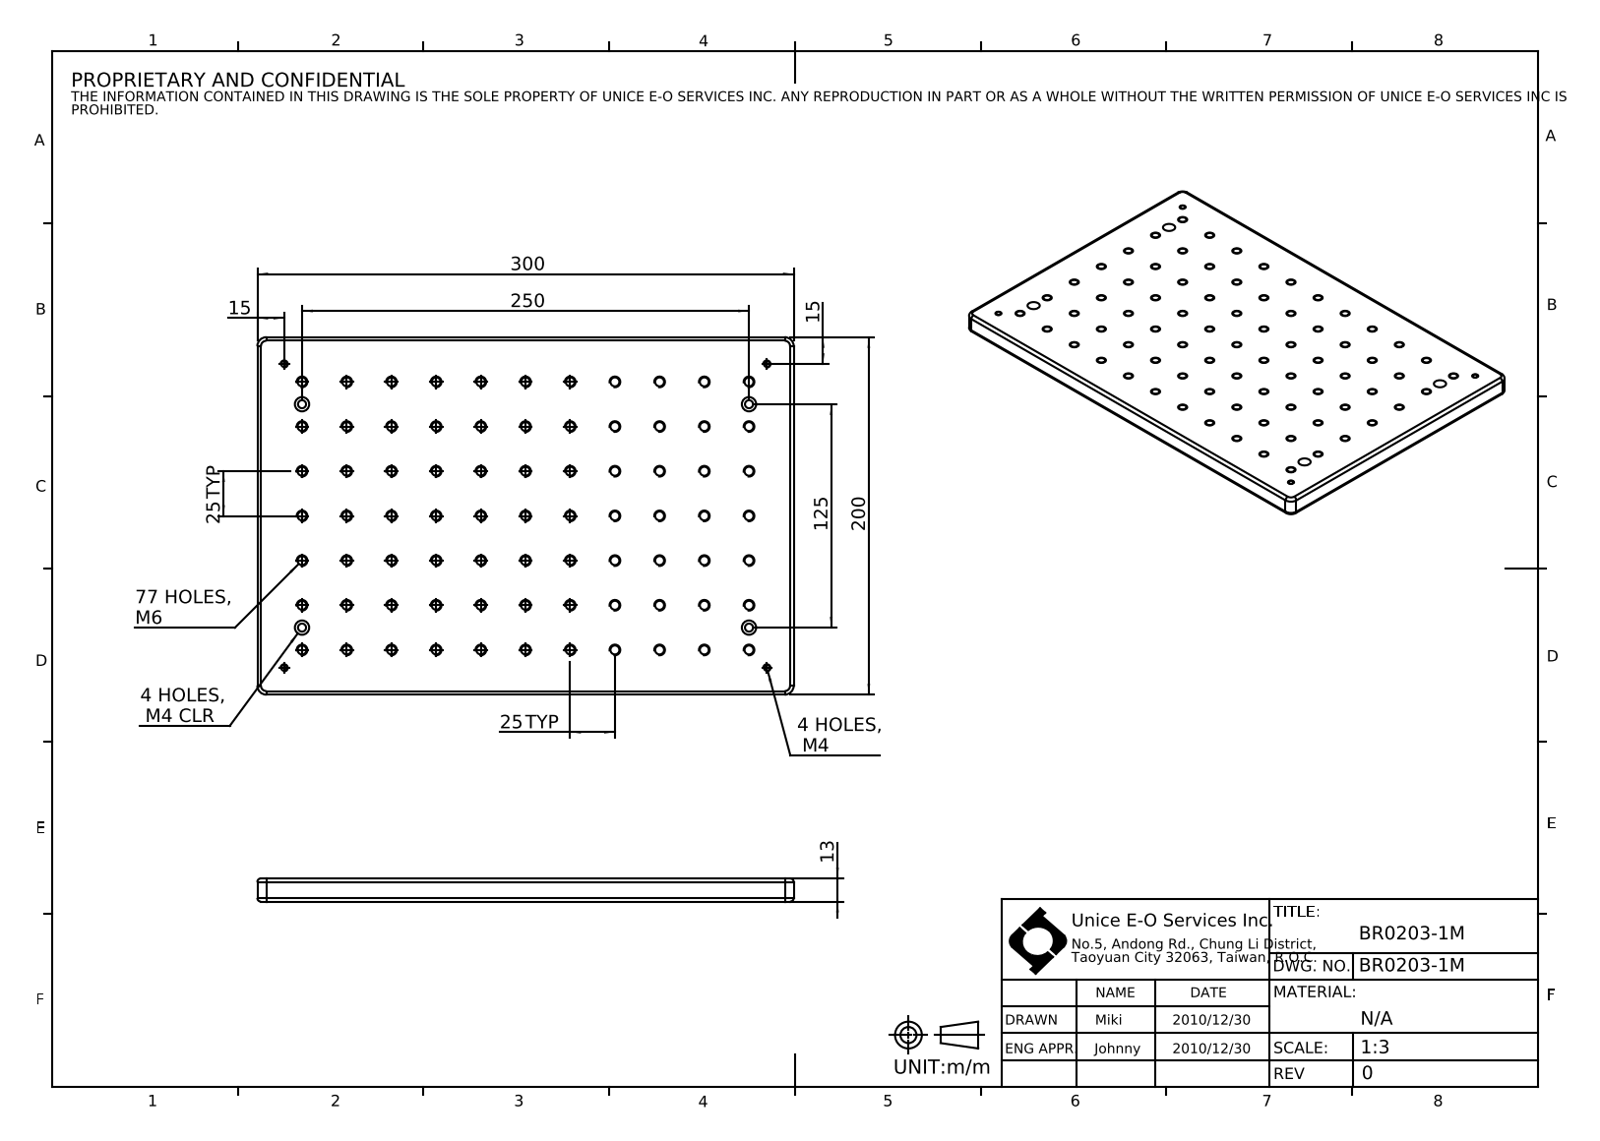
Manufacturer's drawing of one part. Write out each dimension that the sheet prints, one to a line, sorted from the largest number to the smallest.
300
250
200
125
77 HOLES, M6
25 TYP
25 TYP
15
15
13
4 HOLES, M 4
4 HOLES, M4 CLR
